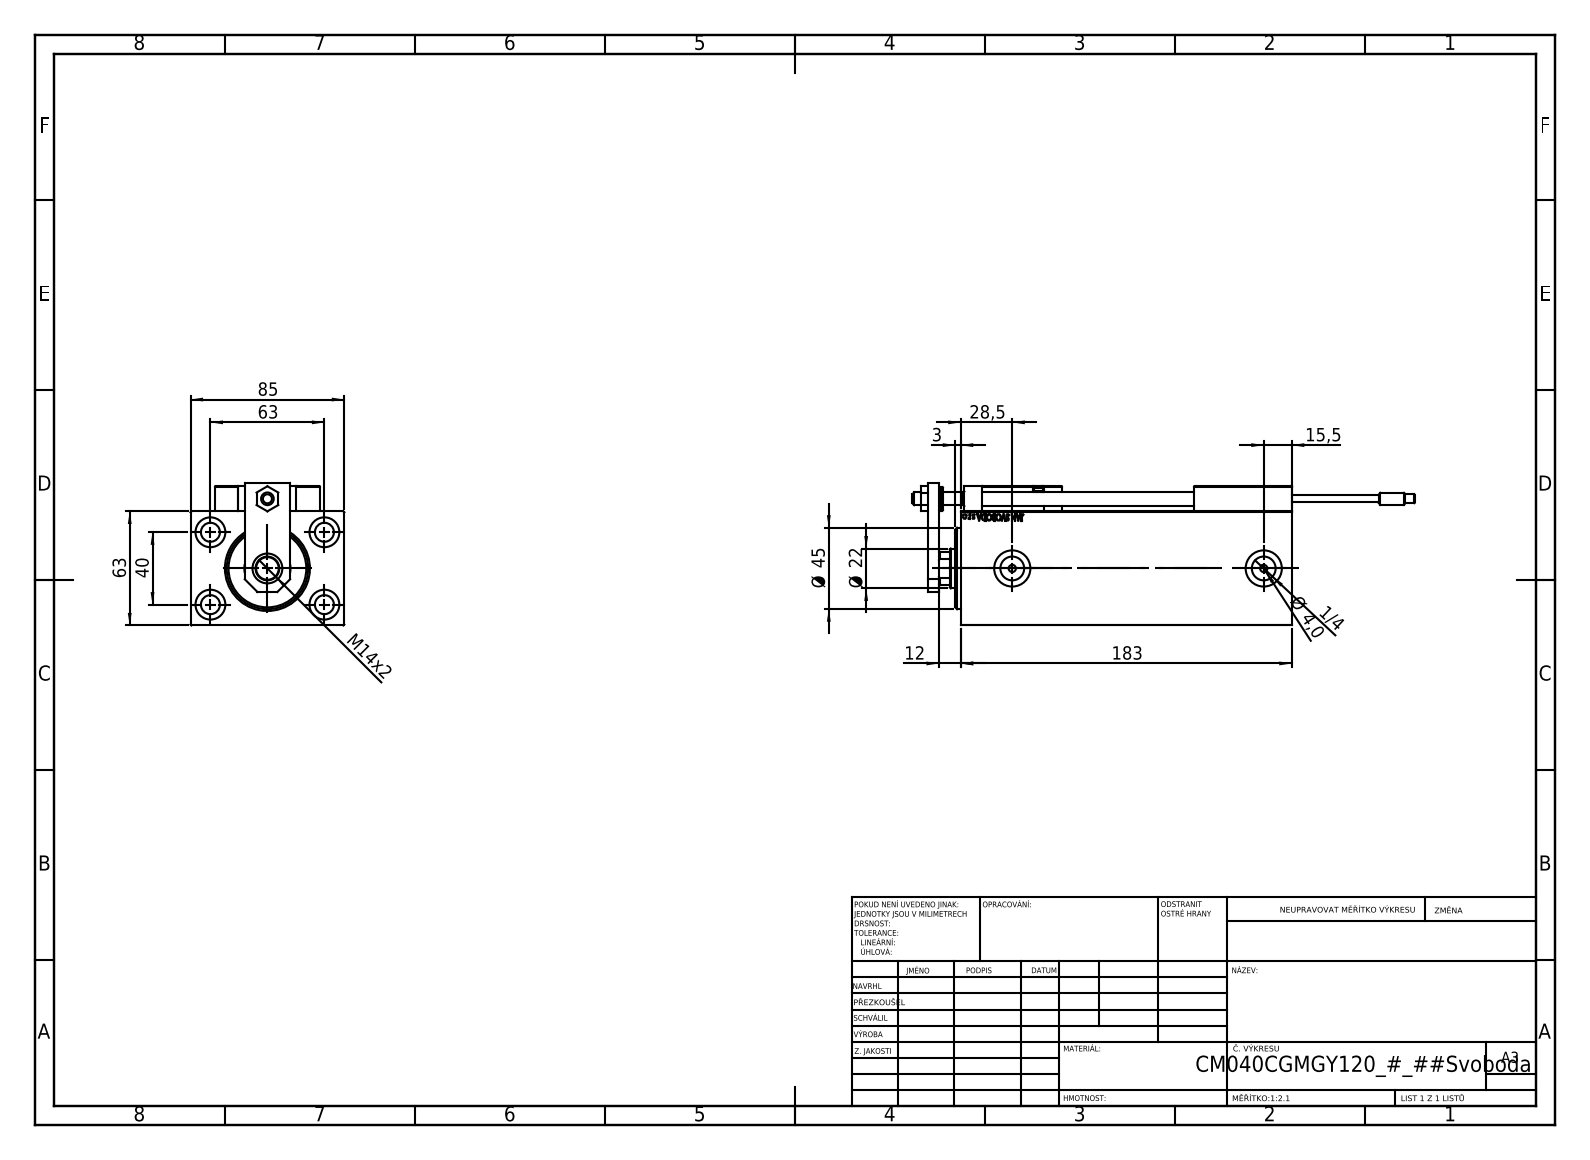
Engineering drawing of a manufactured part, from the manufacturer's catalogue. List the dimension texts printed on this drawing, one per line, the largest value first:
183
85
63
63
Ø 45
40
28,5
Ø 22
15,5
M14x2
12
Ø 4,0
3
1/4
